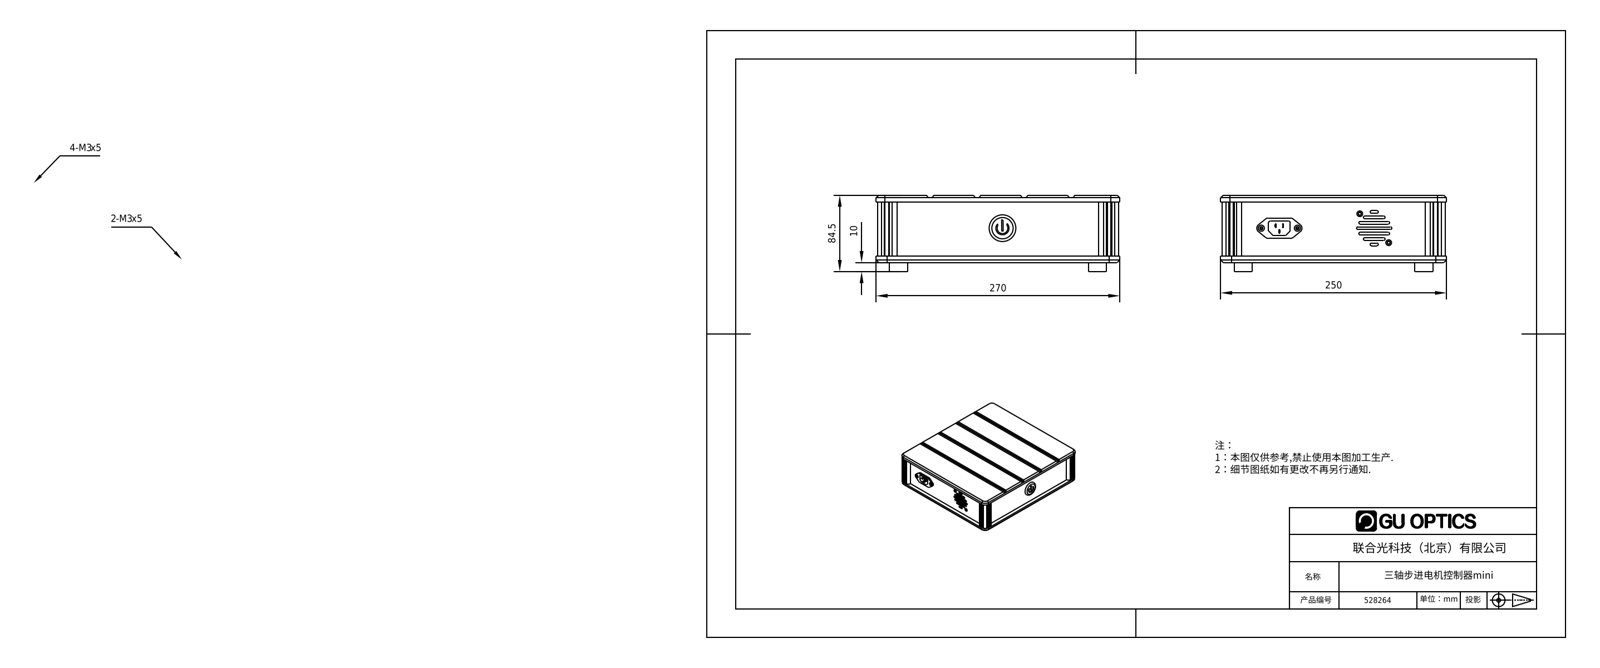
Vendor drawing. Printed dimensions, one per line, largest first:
270
250
84.5
10
